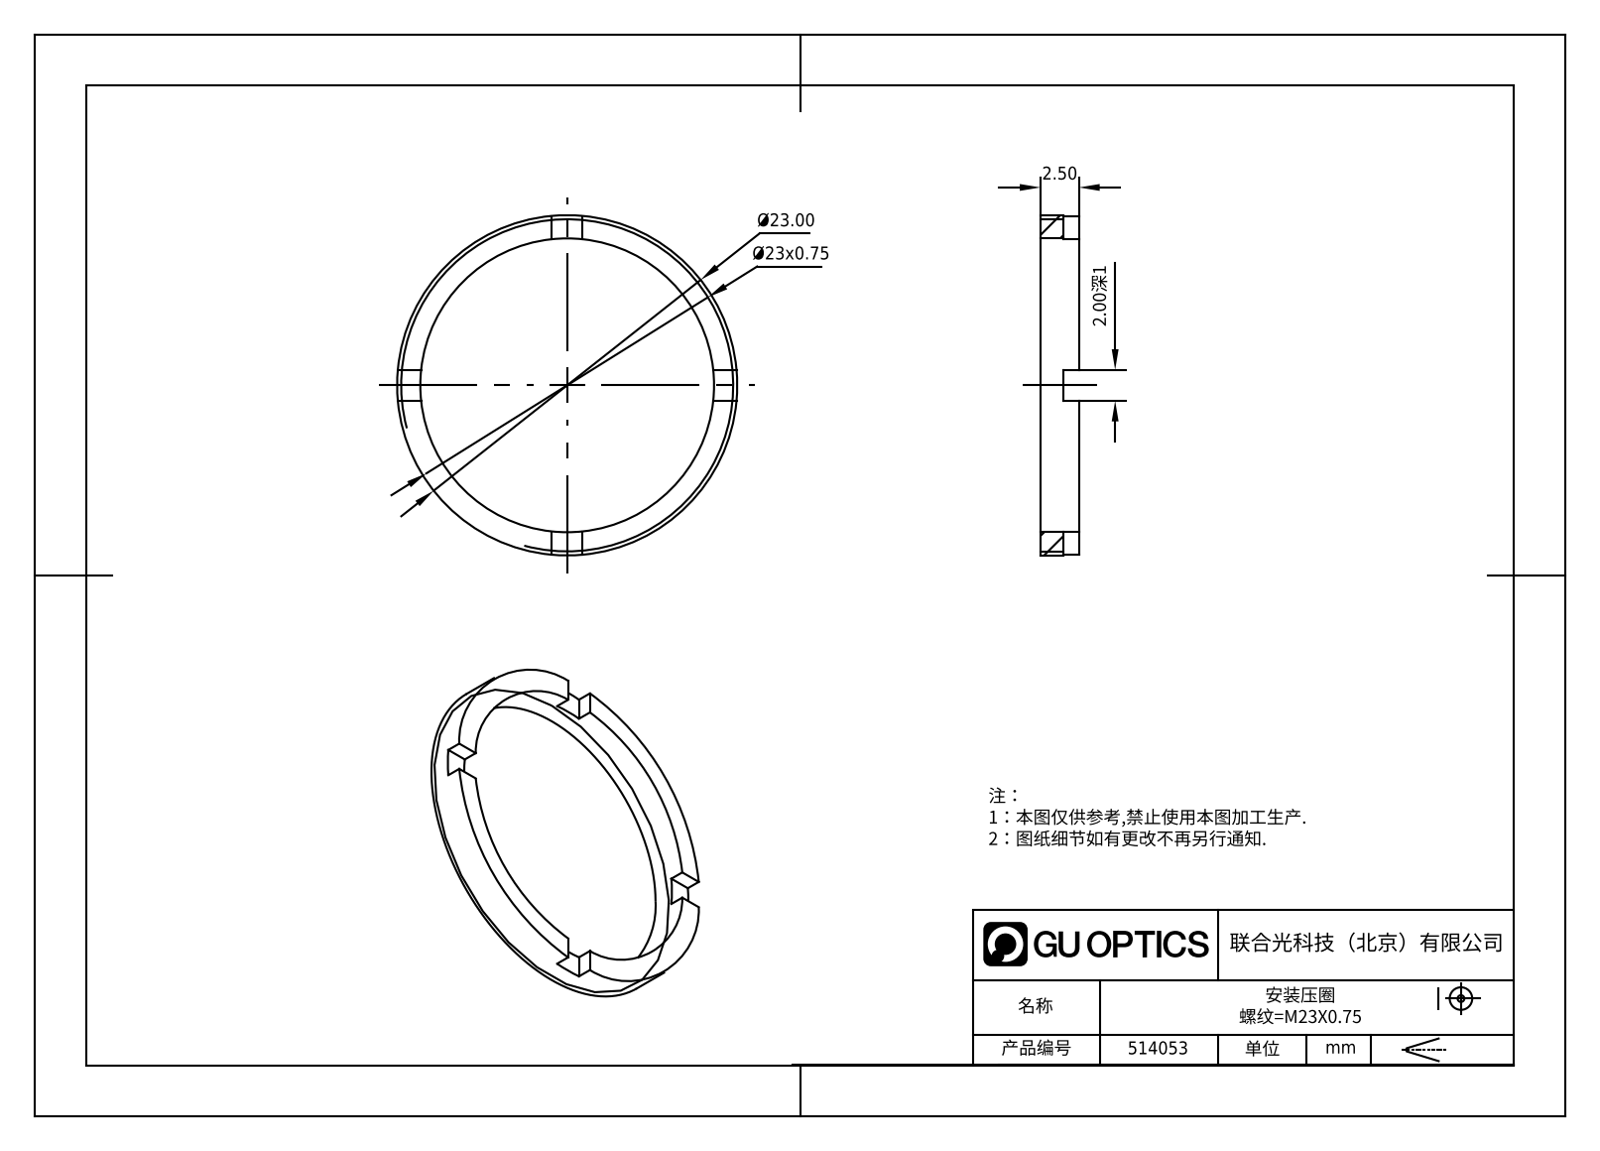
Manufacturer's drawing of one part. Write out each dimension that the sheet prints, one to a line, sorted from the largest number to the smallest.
Ø23.00
Ø23x0.75
2.50
2.00深1
